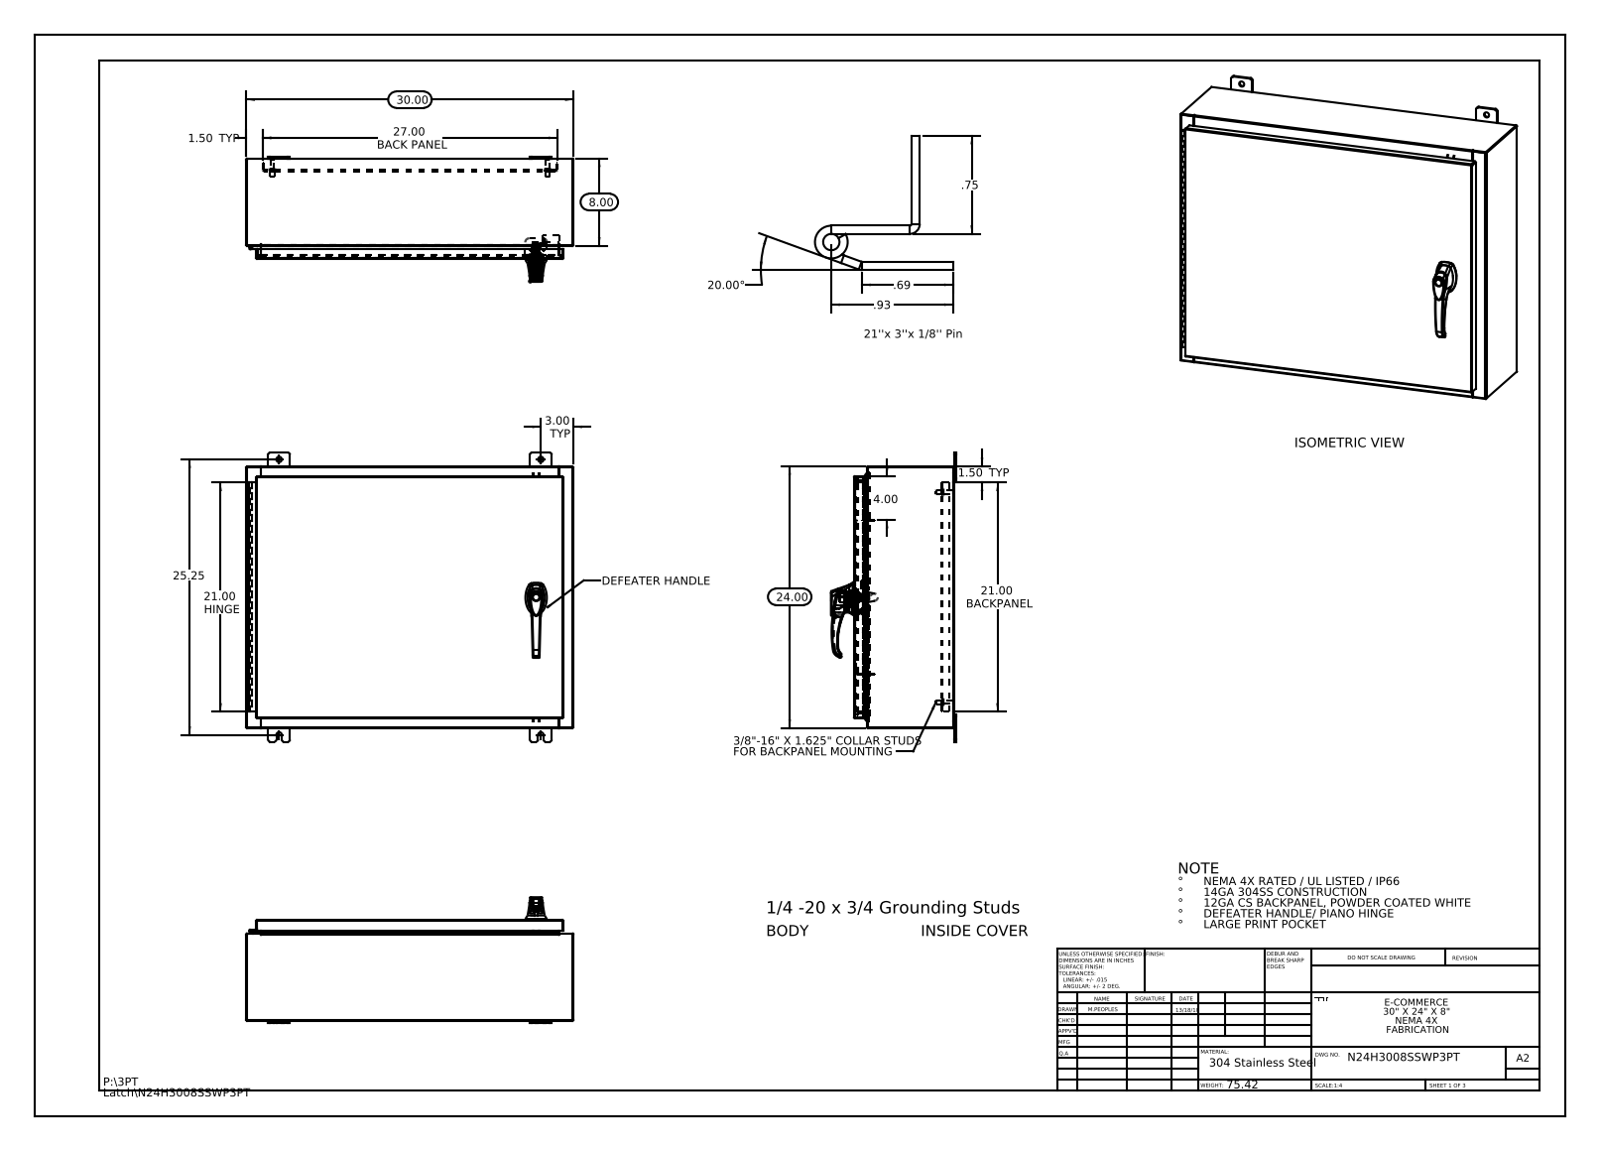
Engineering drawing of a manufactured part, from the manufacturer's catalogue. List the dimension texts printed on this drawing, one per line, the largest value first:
30.00
27.00 BACK PANEL
25.25
24.00
21.00 HINGE
21.00 BACKPANEL
20.00°
8.00
4.00
3.00 TYP
1.50 TYP
1.50 TYP
.93
.75
.69
